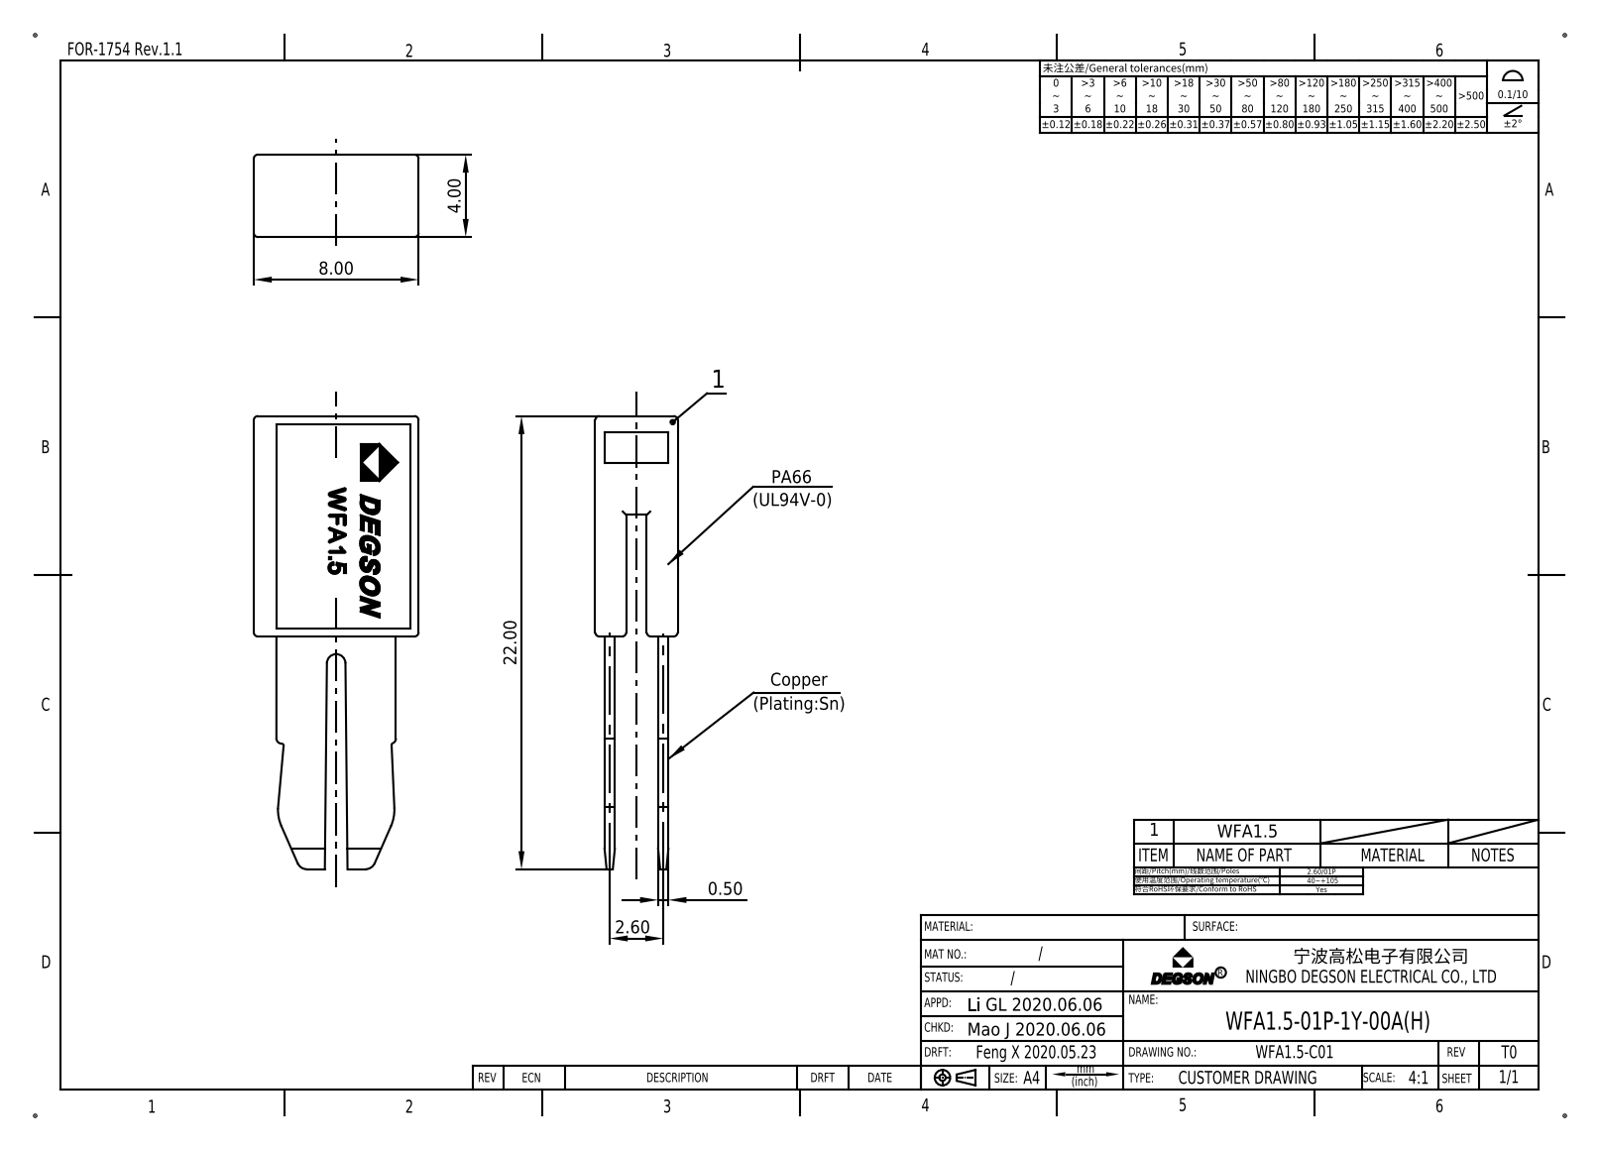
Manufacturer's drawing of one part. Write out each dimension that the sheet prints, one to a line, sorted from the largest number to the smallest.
22.00
8.00
4.00
2.60
0.50
